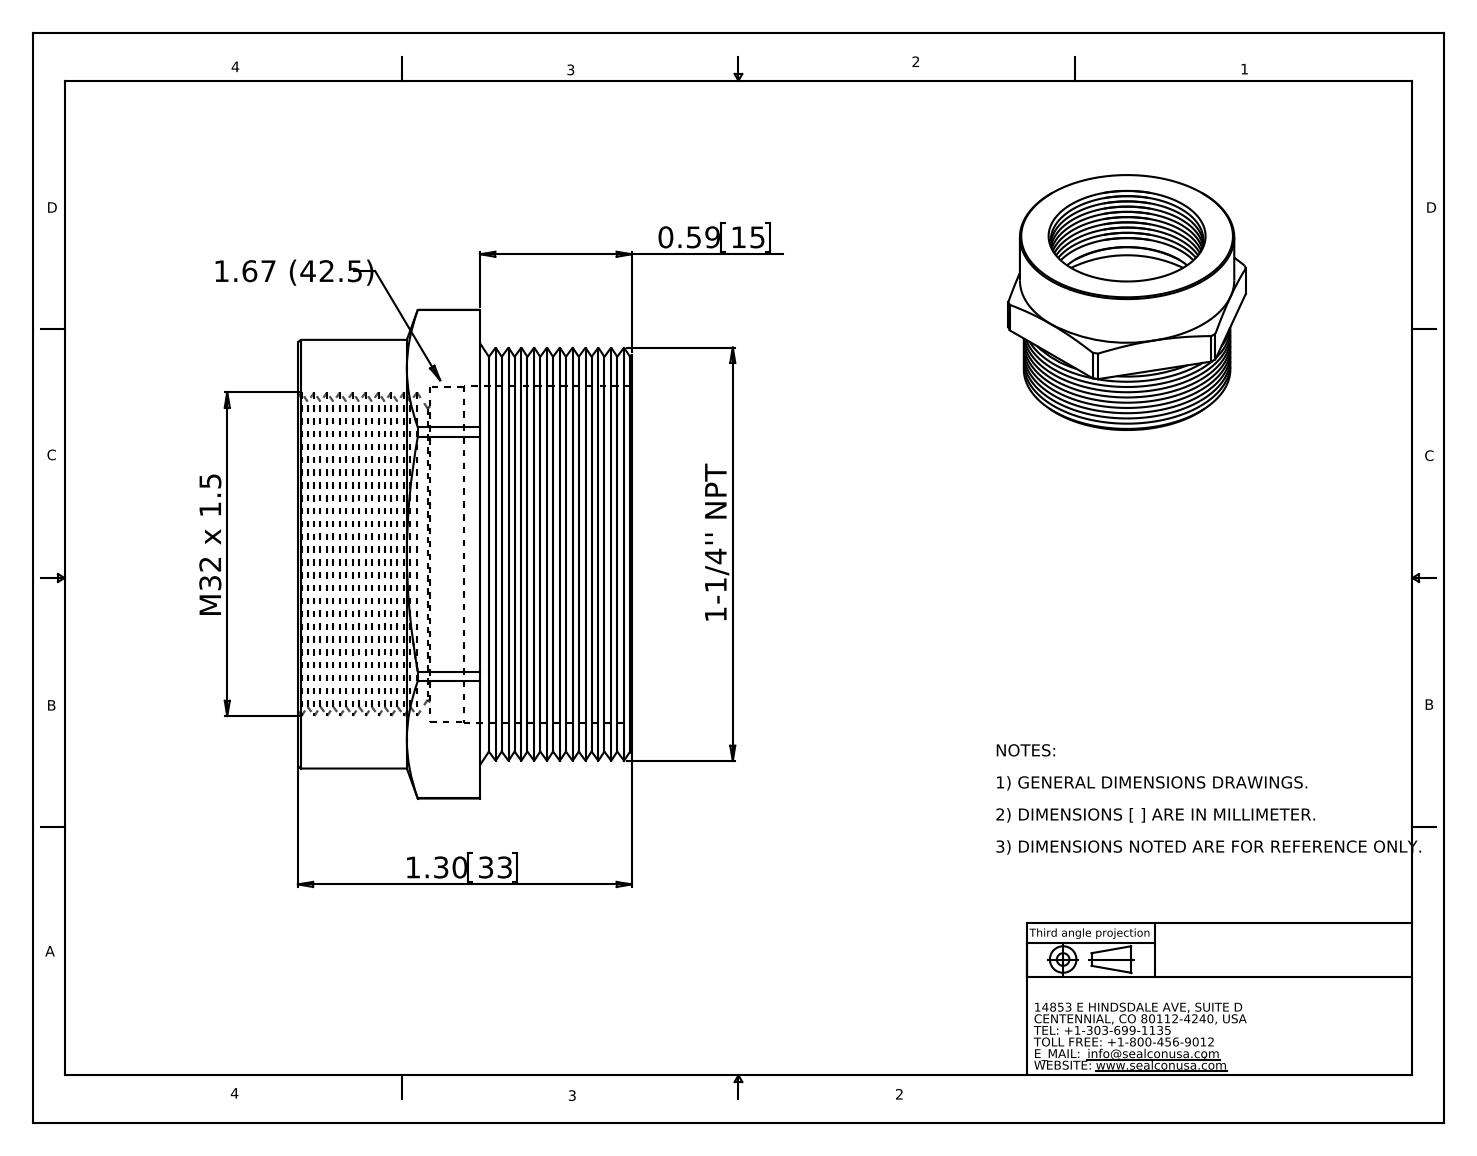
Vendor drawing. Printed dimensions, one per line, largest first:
M32 x 1.5
1.30 33
1-1/4'' NPT
0.59 15
